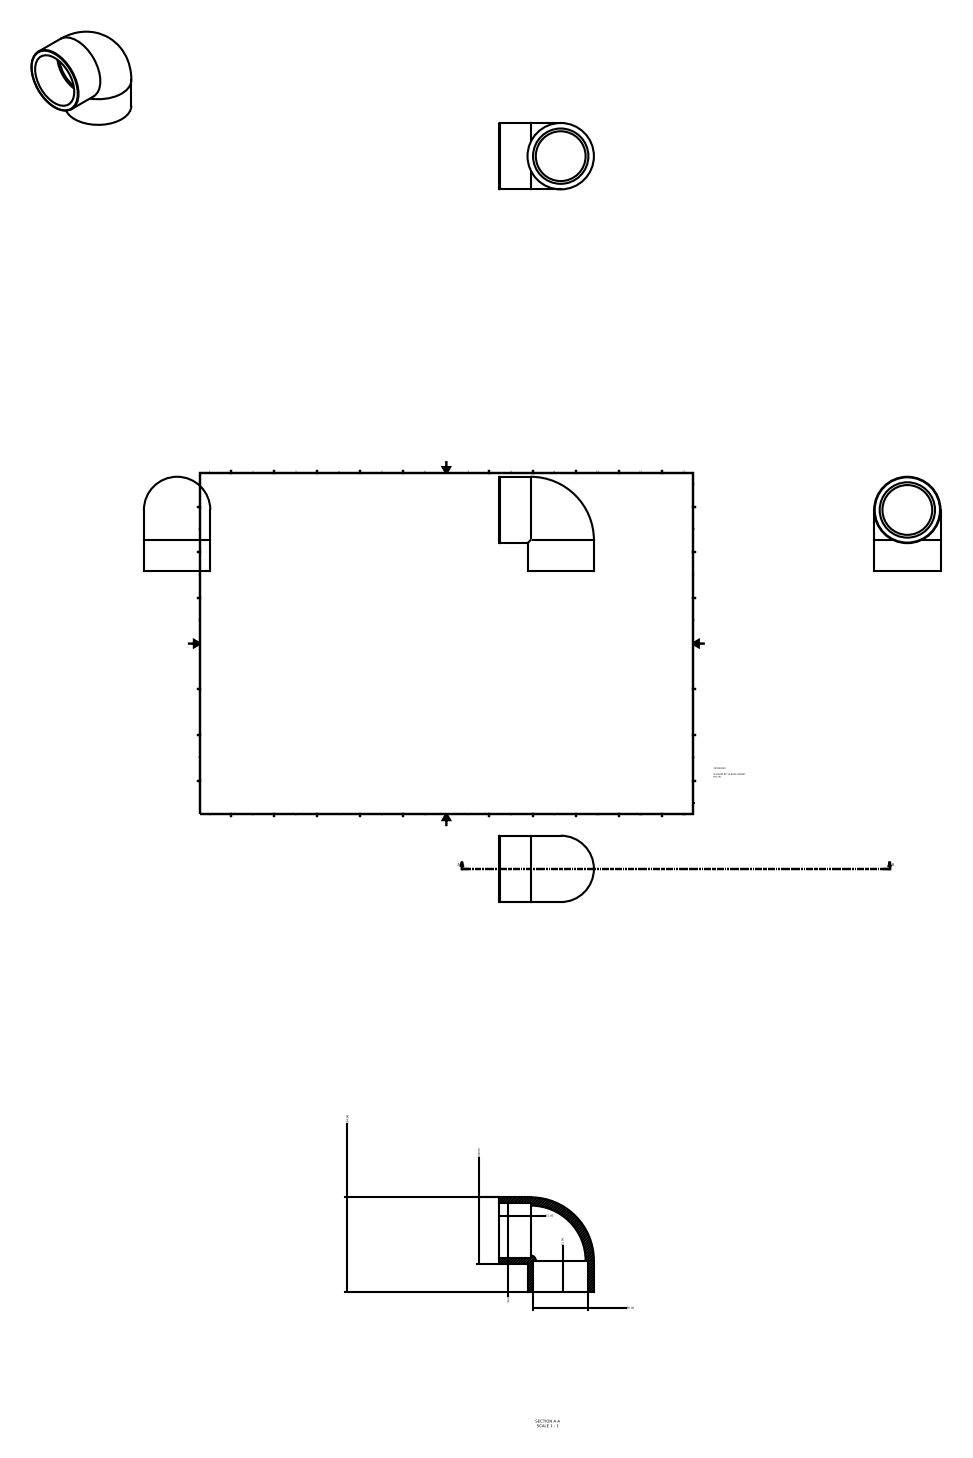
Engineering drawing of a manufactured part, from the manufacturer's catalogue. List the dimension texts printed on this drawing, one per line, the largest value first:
154.00
108.00
90.00
90.00
51.00
51.00
